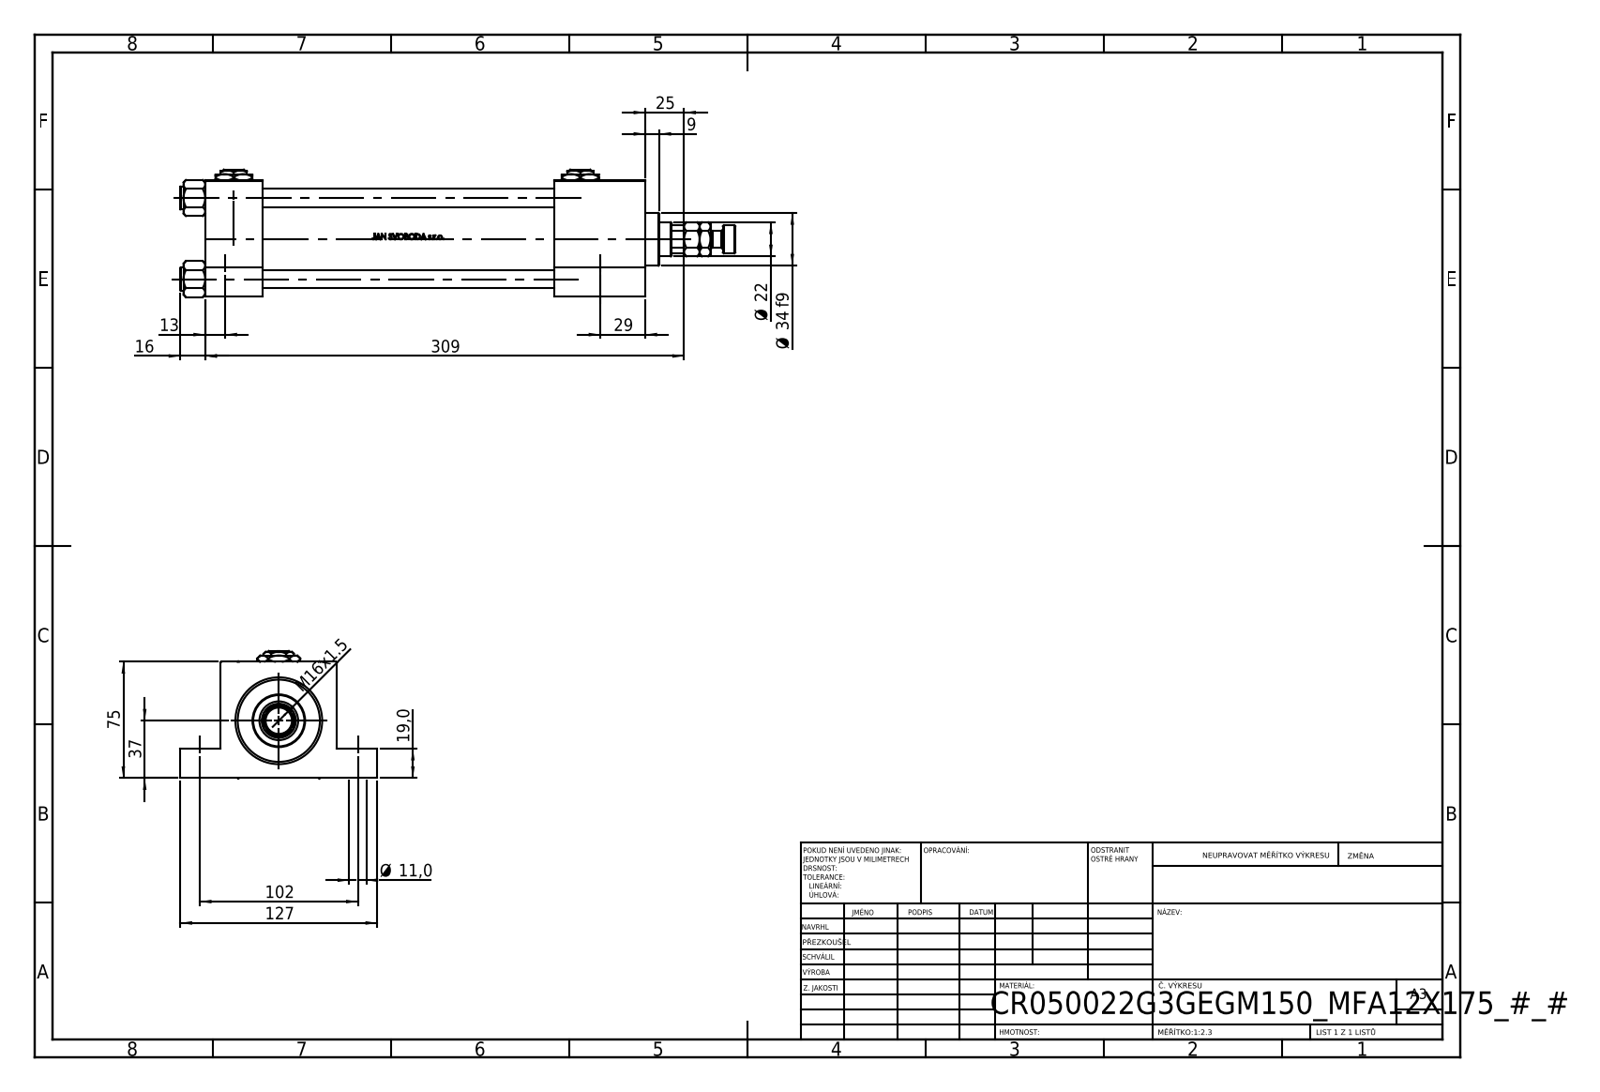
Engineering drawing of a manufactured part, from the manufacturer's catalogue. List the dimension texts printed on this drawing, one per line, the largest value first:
309
127
102
75
37
Ø 34 f9
29
25
Ø 22
19,0
16
M16x1.5
13
Ø 11,0
9
